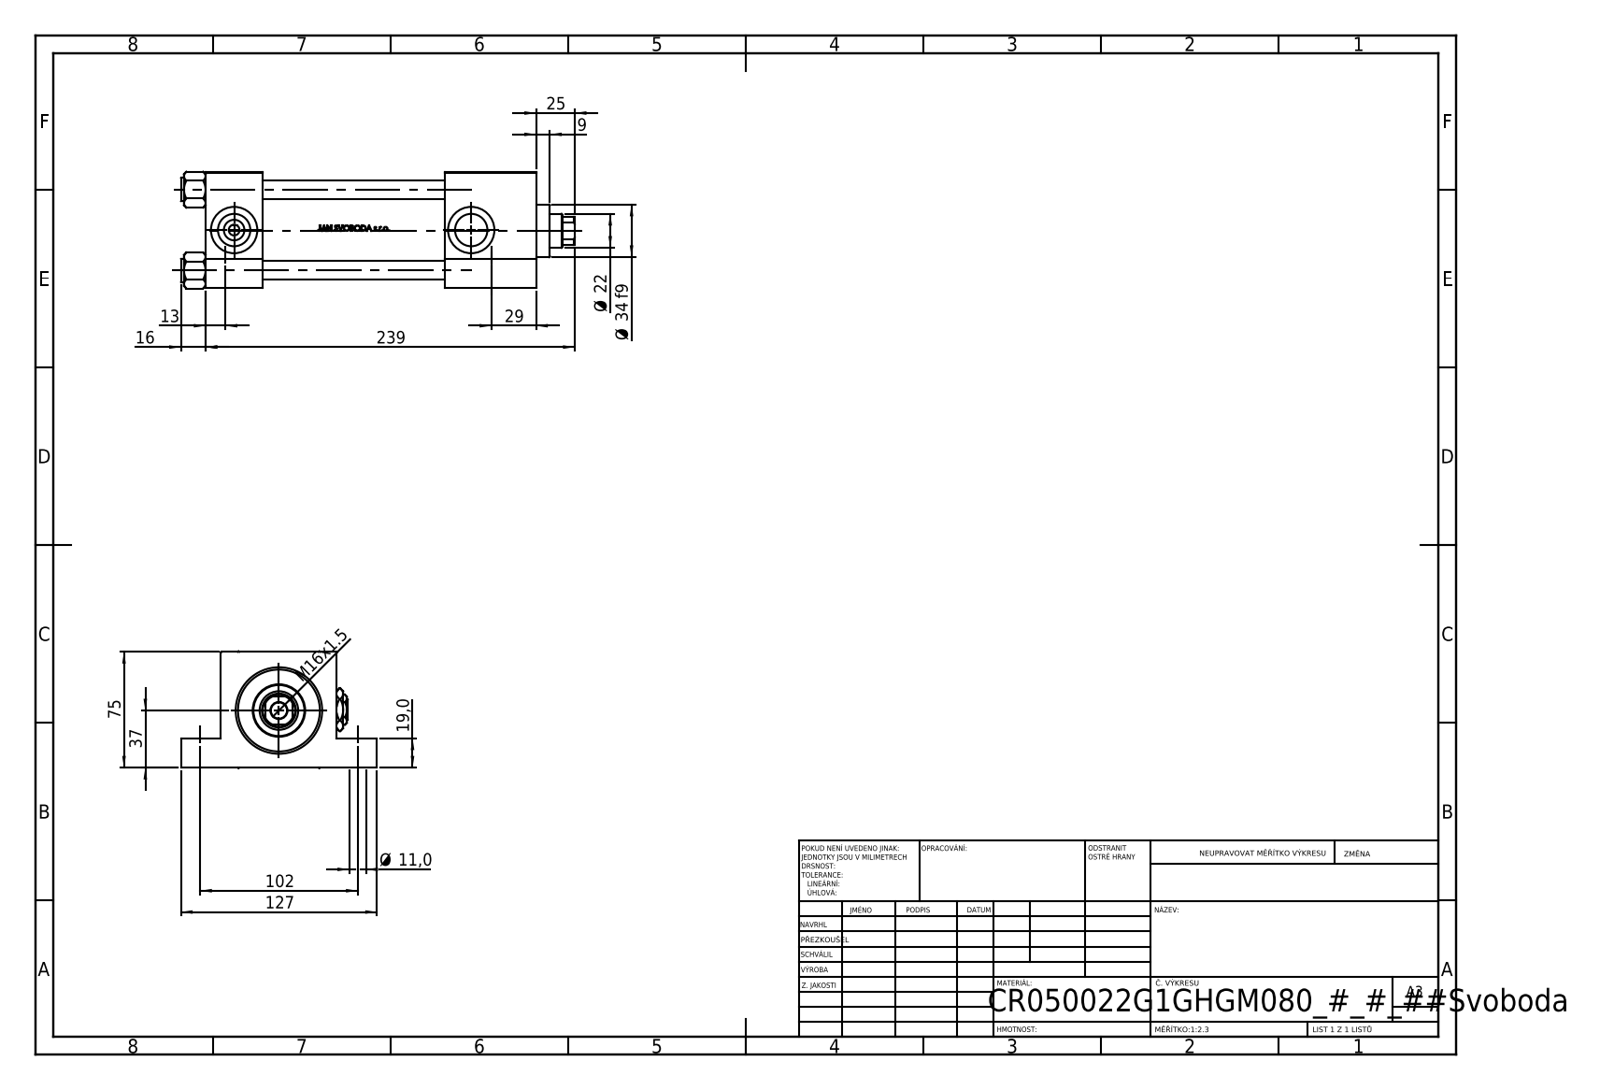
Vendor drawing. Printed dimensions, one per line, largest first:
239
127
102
75
37
Ø 34 f9
29
25
Ø 22
19,0
16
M16x1.5
13
Ø 11,0
9
